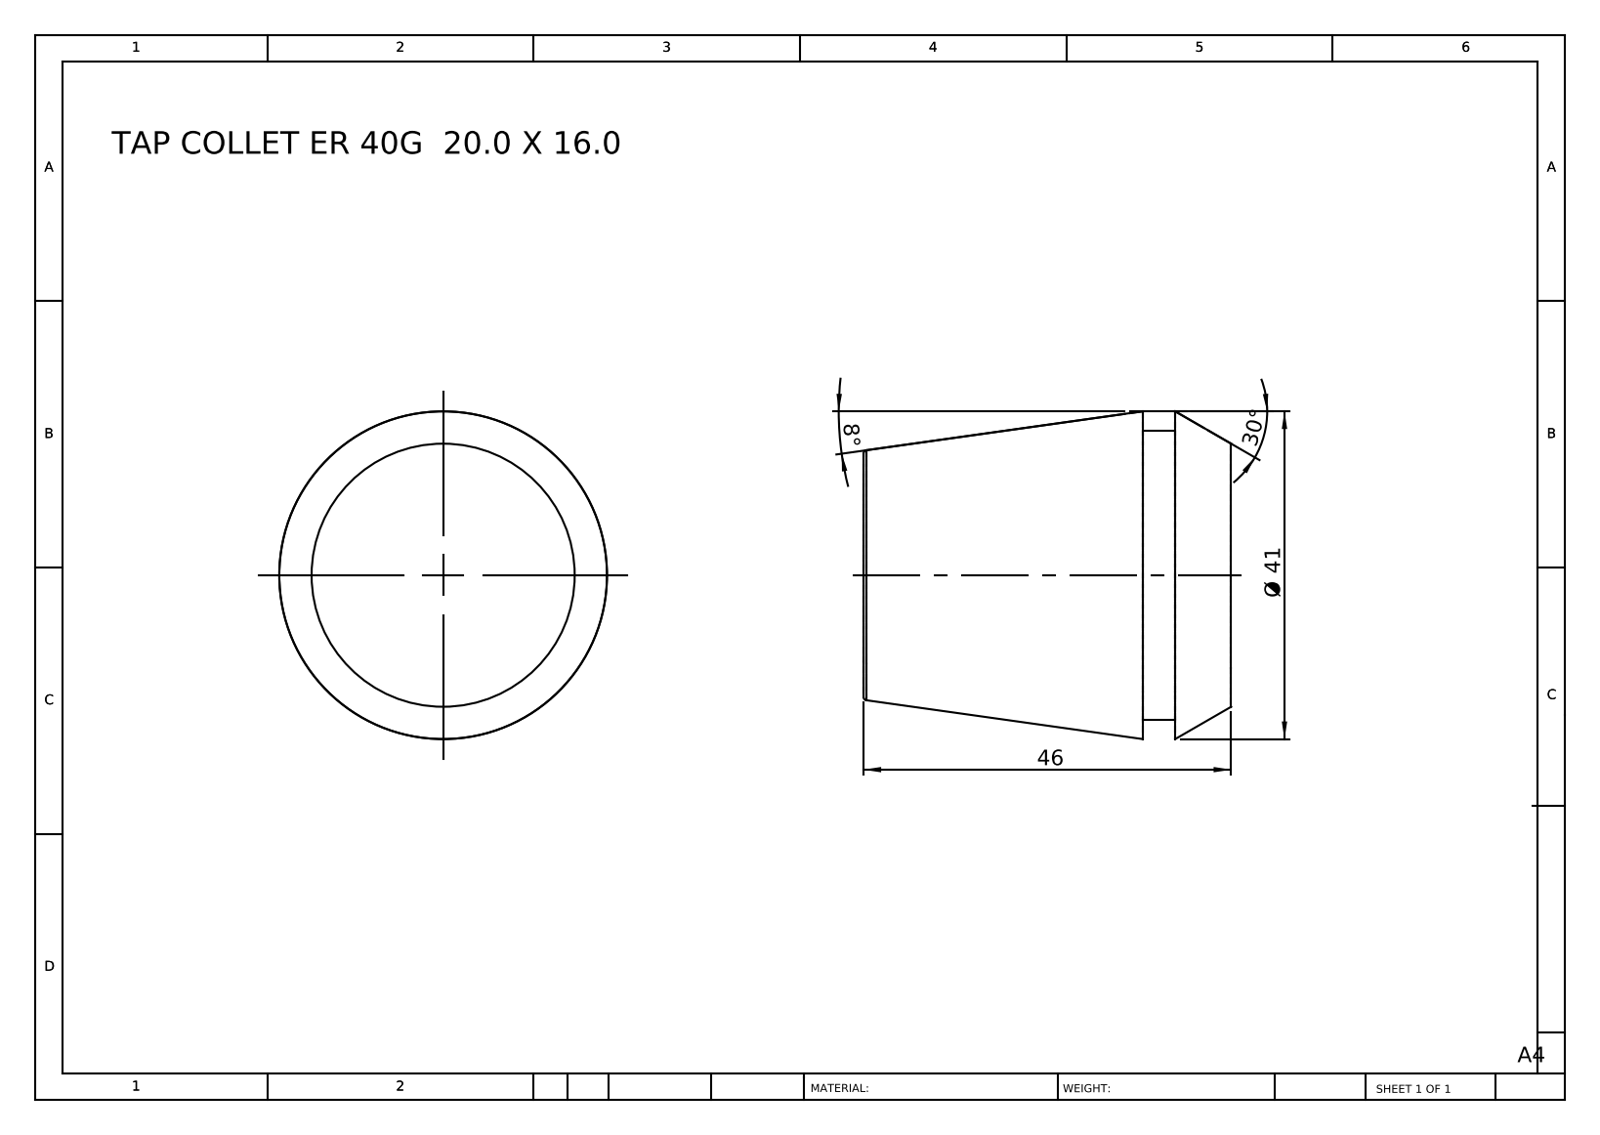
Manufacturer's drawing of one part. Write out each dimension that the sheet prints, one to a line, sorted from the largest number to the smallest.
46
Ø 41
30°
8°
